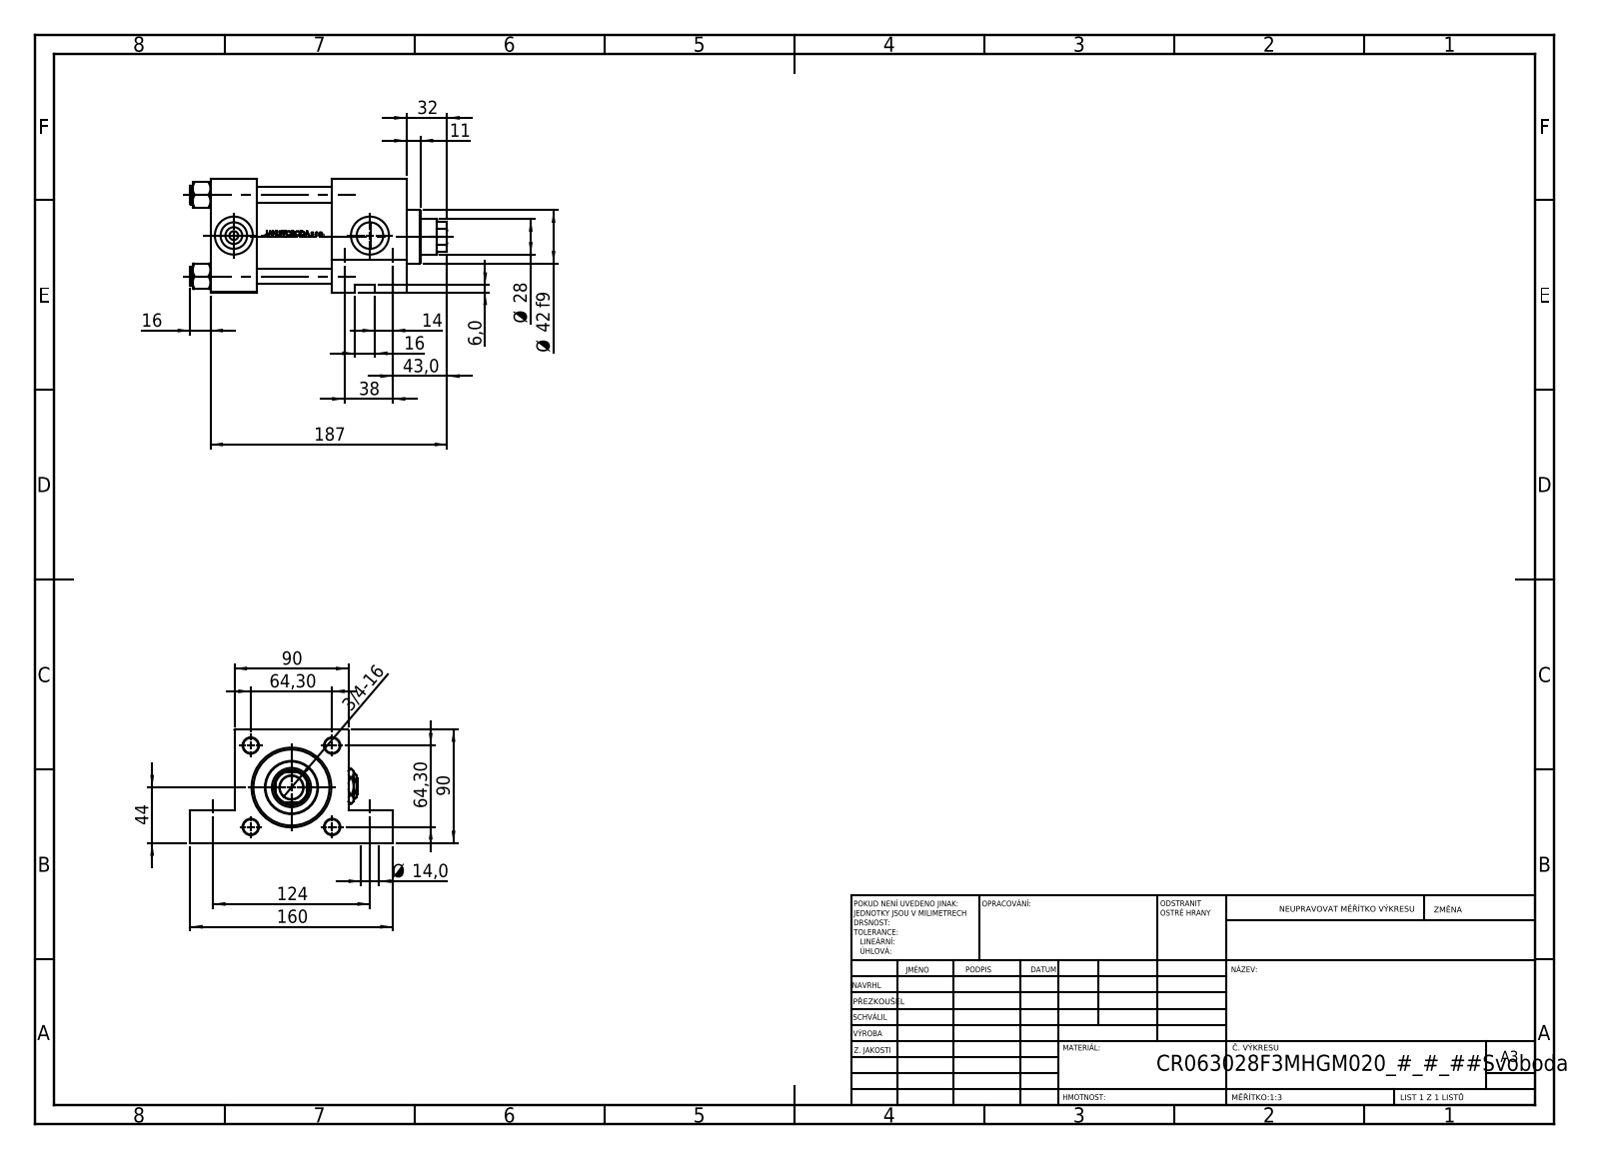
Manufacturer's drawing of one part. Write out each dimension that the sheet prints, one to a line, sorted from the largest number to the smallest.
187
160
124
90
90
64,30
64,30
44
43,0
Ø 42 f9
38
32
Ø 28
16
16
14
Ø 14,0
11
6,0
3/4-16
